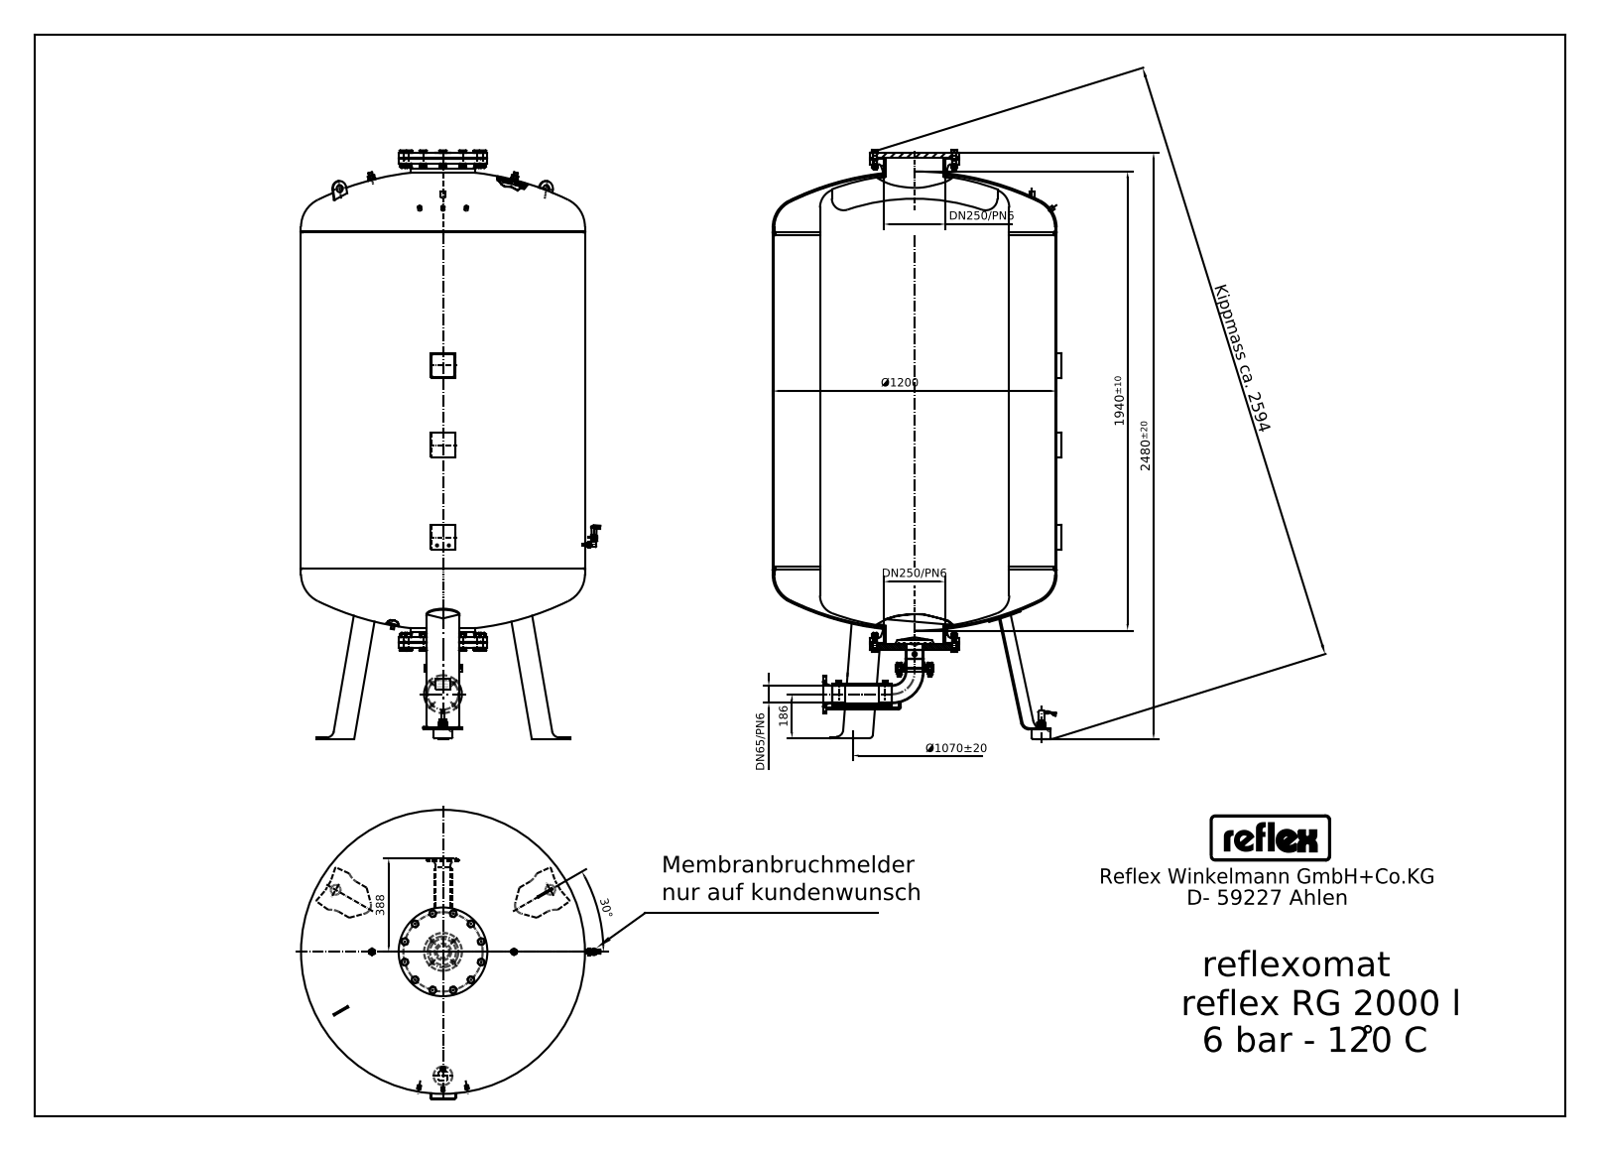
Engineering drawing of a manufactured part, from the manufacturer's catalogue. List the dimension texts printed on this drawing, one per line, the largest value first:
Kippmass ca. 2594
2480±20
1940±10
Ø1200
Ø1070±20
388
DN250/PN6
DN250/PN6
186
DN65/PN6
30°
